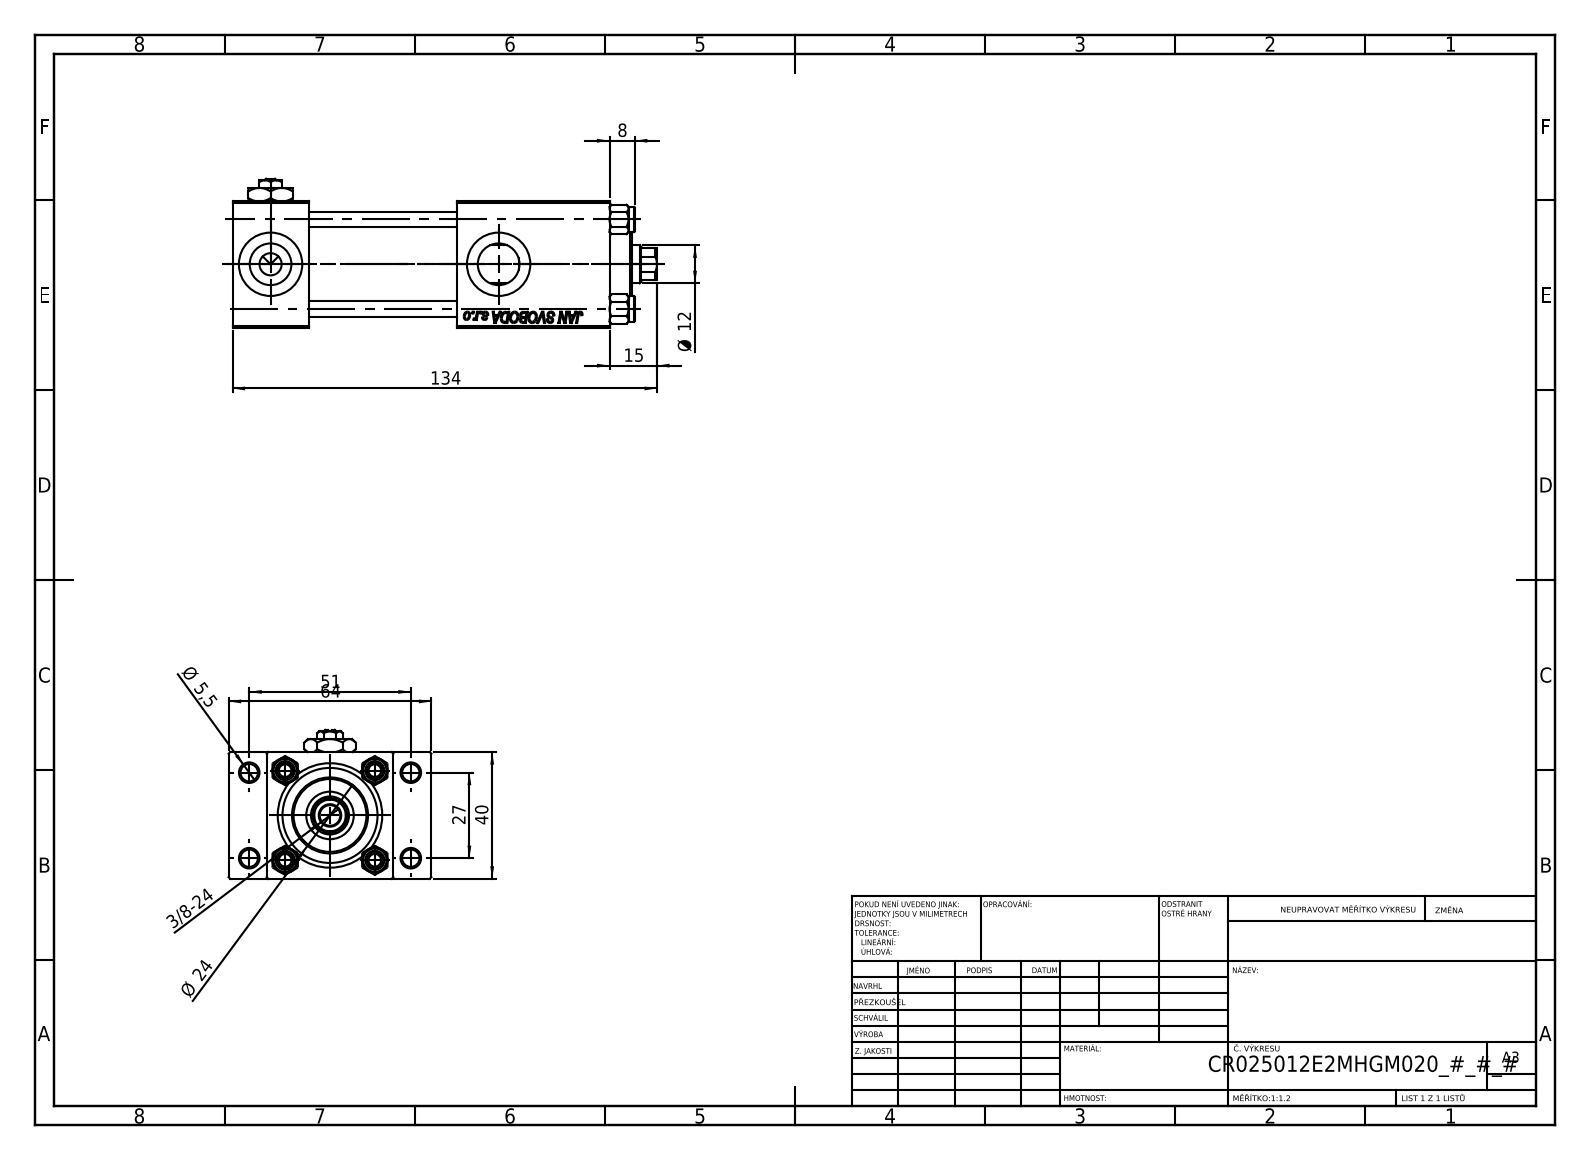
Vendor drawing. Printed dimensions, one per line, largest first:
134
64
51
40
27
Ø 24
15
Ø 12
8
Ø 5,5
3/8-24
